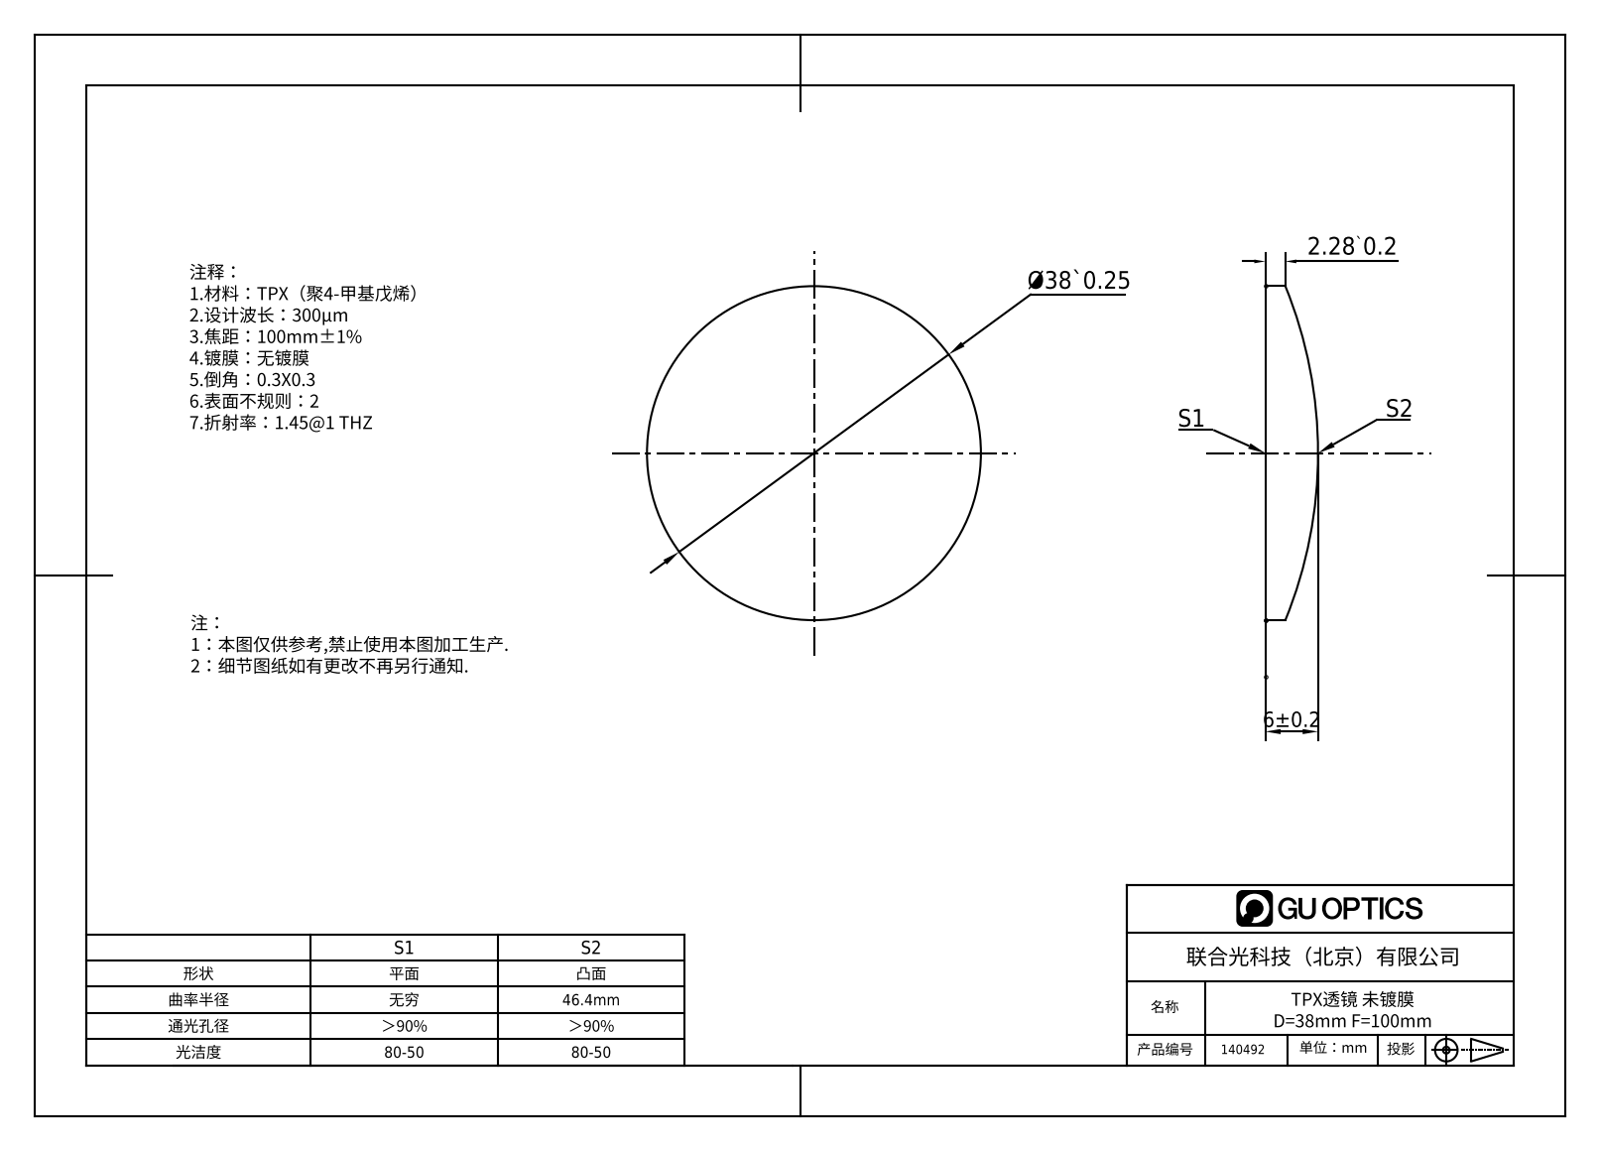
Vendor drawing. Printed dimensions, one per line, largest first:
Ø38`0.25
6±0.2
2.28`0.2
